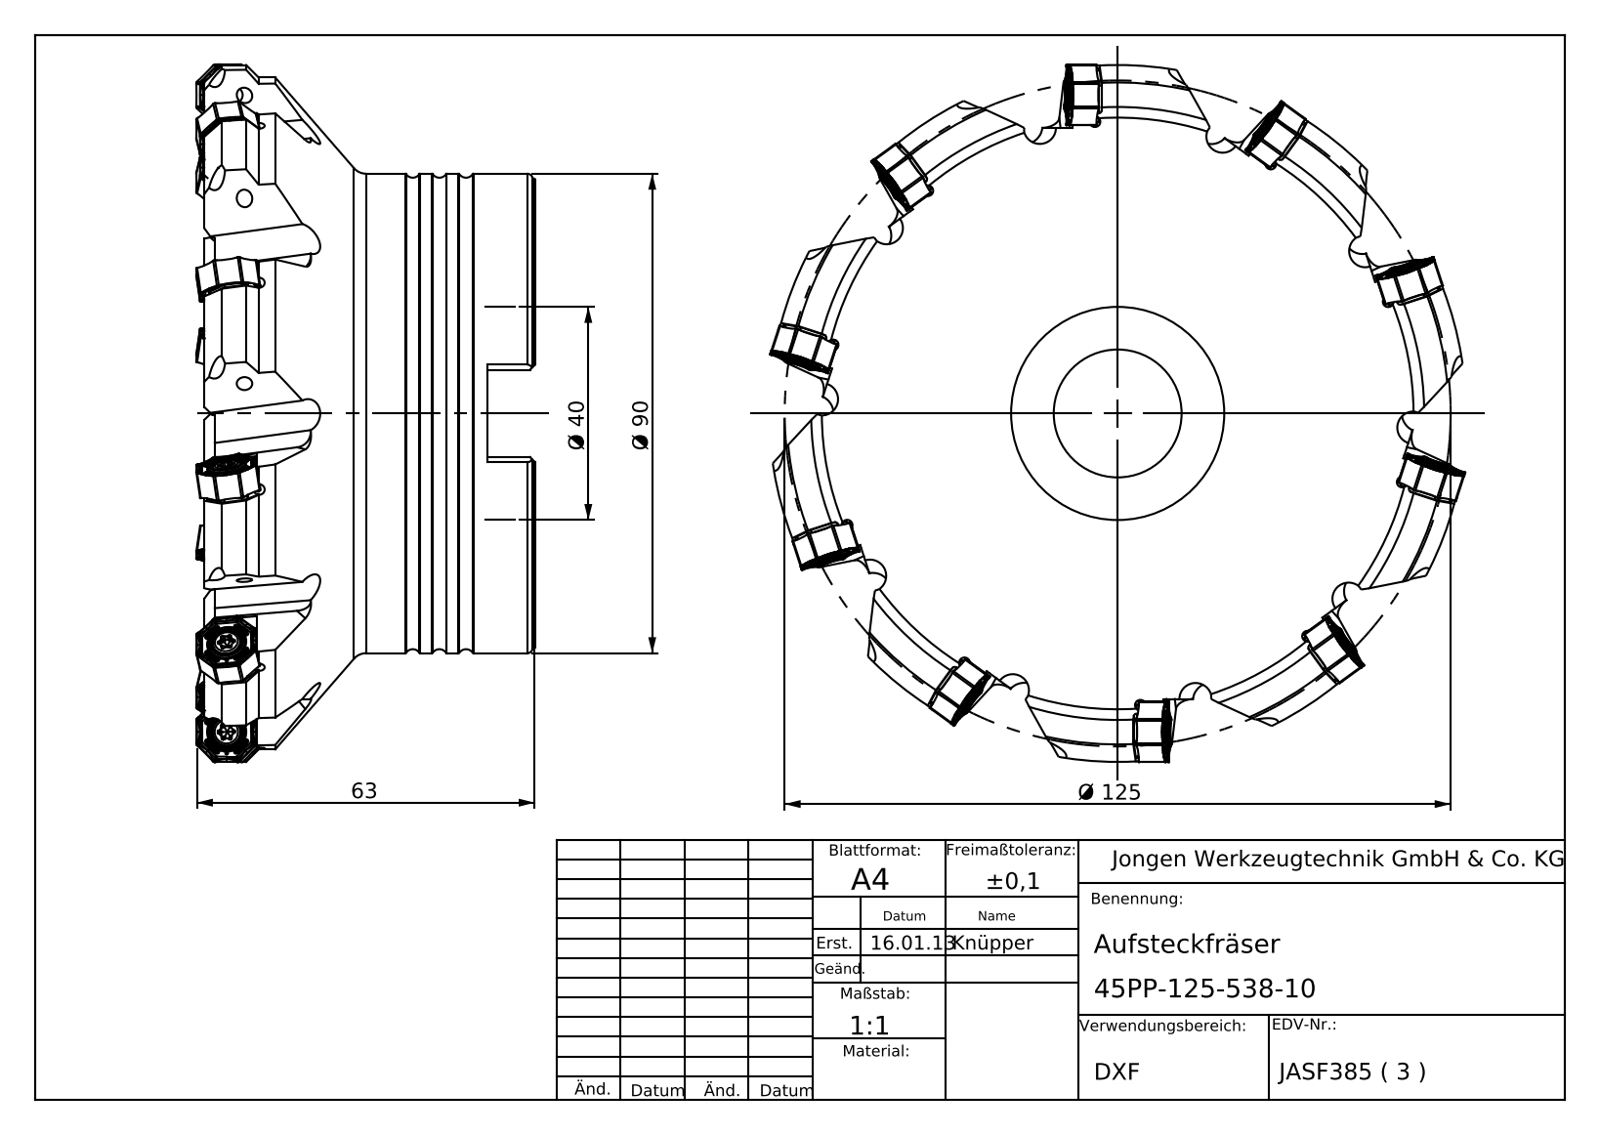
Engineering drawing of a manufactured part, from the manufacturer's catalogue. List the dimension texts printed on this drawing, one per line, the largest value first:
Ø 125
Ø 90
63
Ø 40
